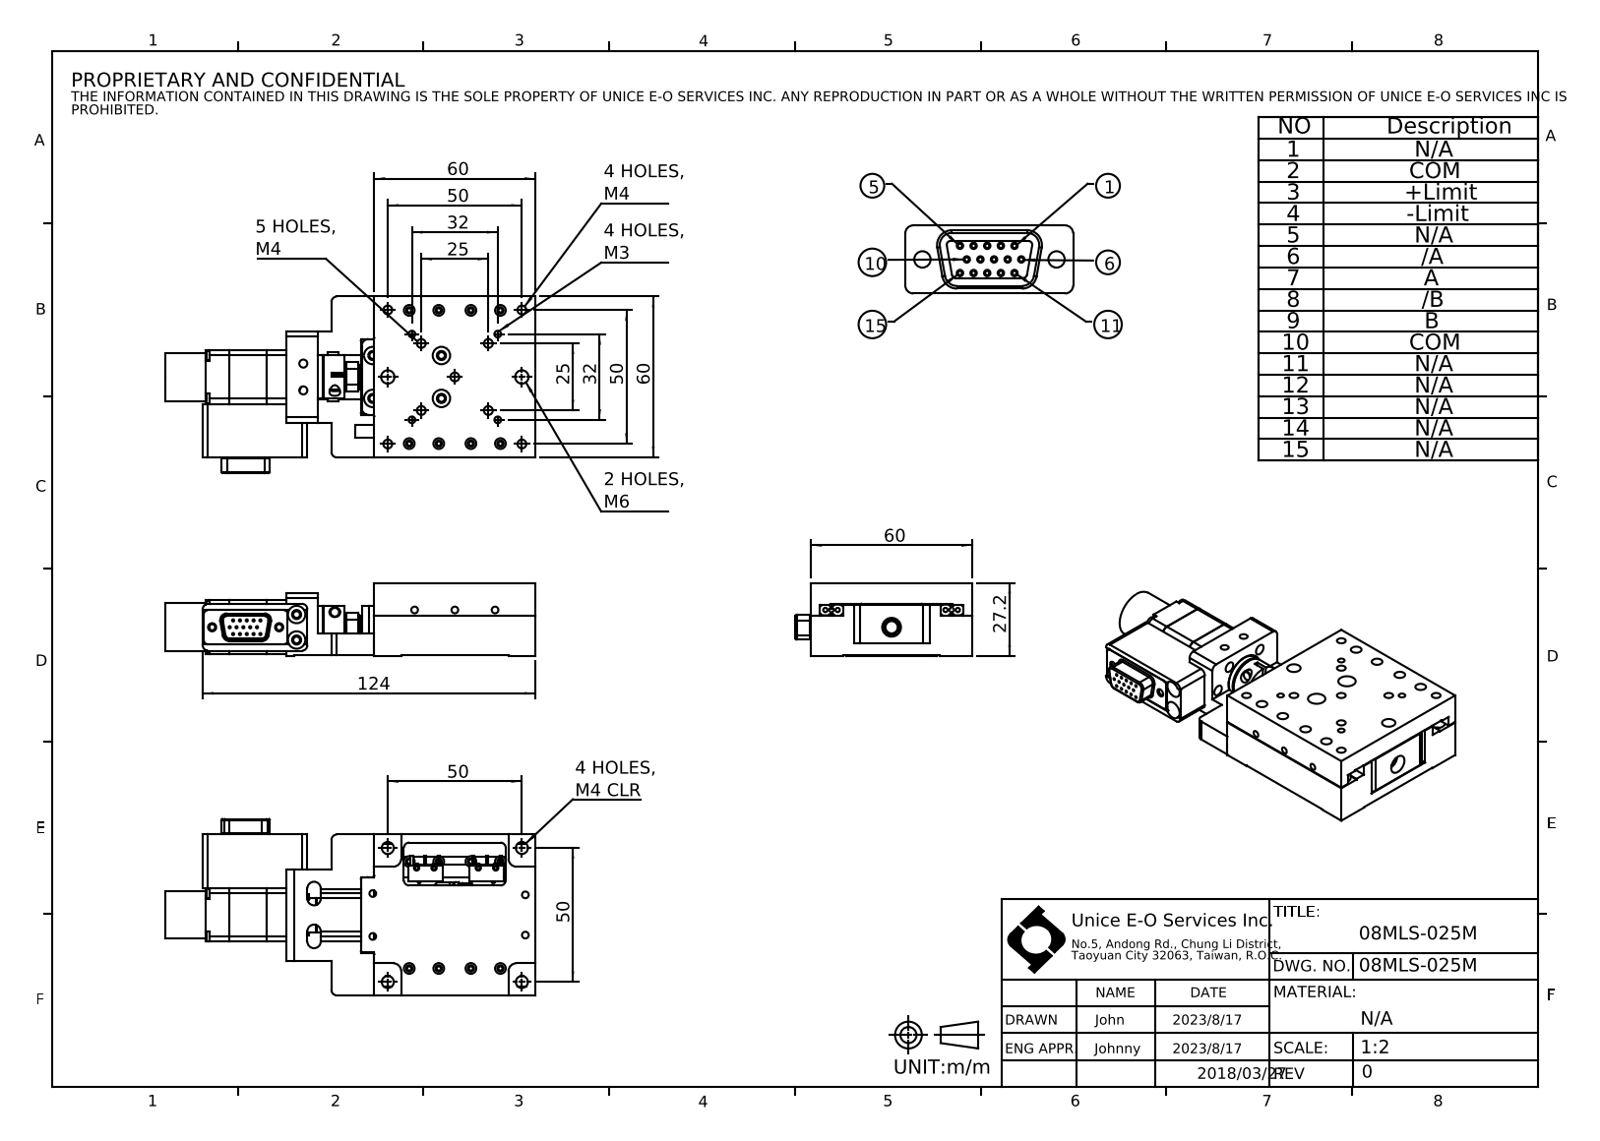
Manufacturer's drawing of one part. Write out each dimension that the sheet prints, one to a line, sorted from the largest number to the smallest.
124
60
60
60
50
50
50
50
32
32
27.2
25
25
